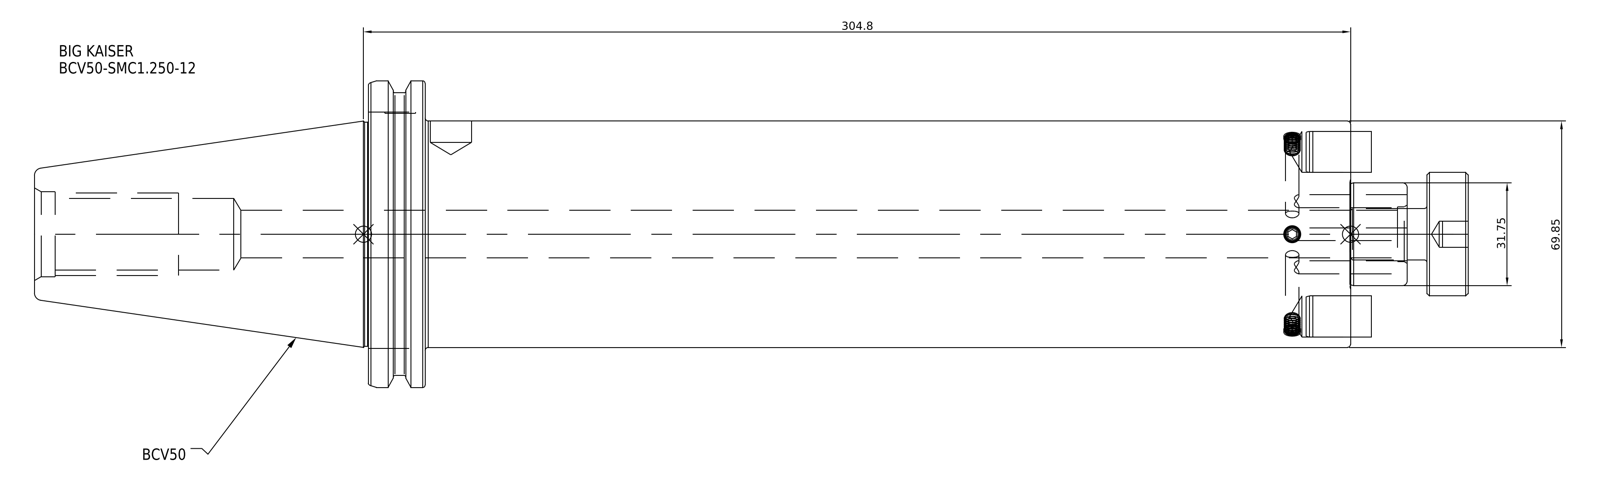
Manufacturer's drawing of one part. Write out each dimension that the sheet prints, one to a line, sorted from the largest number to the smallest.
304.8
69.85
31.75
